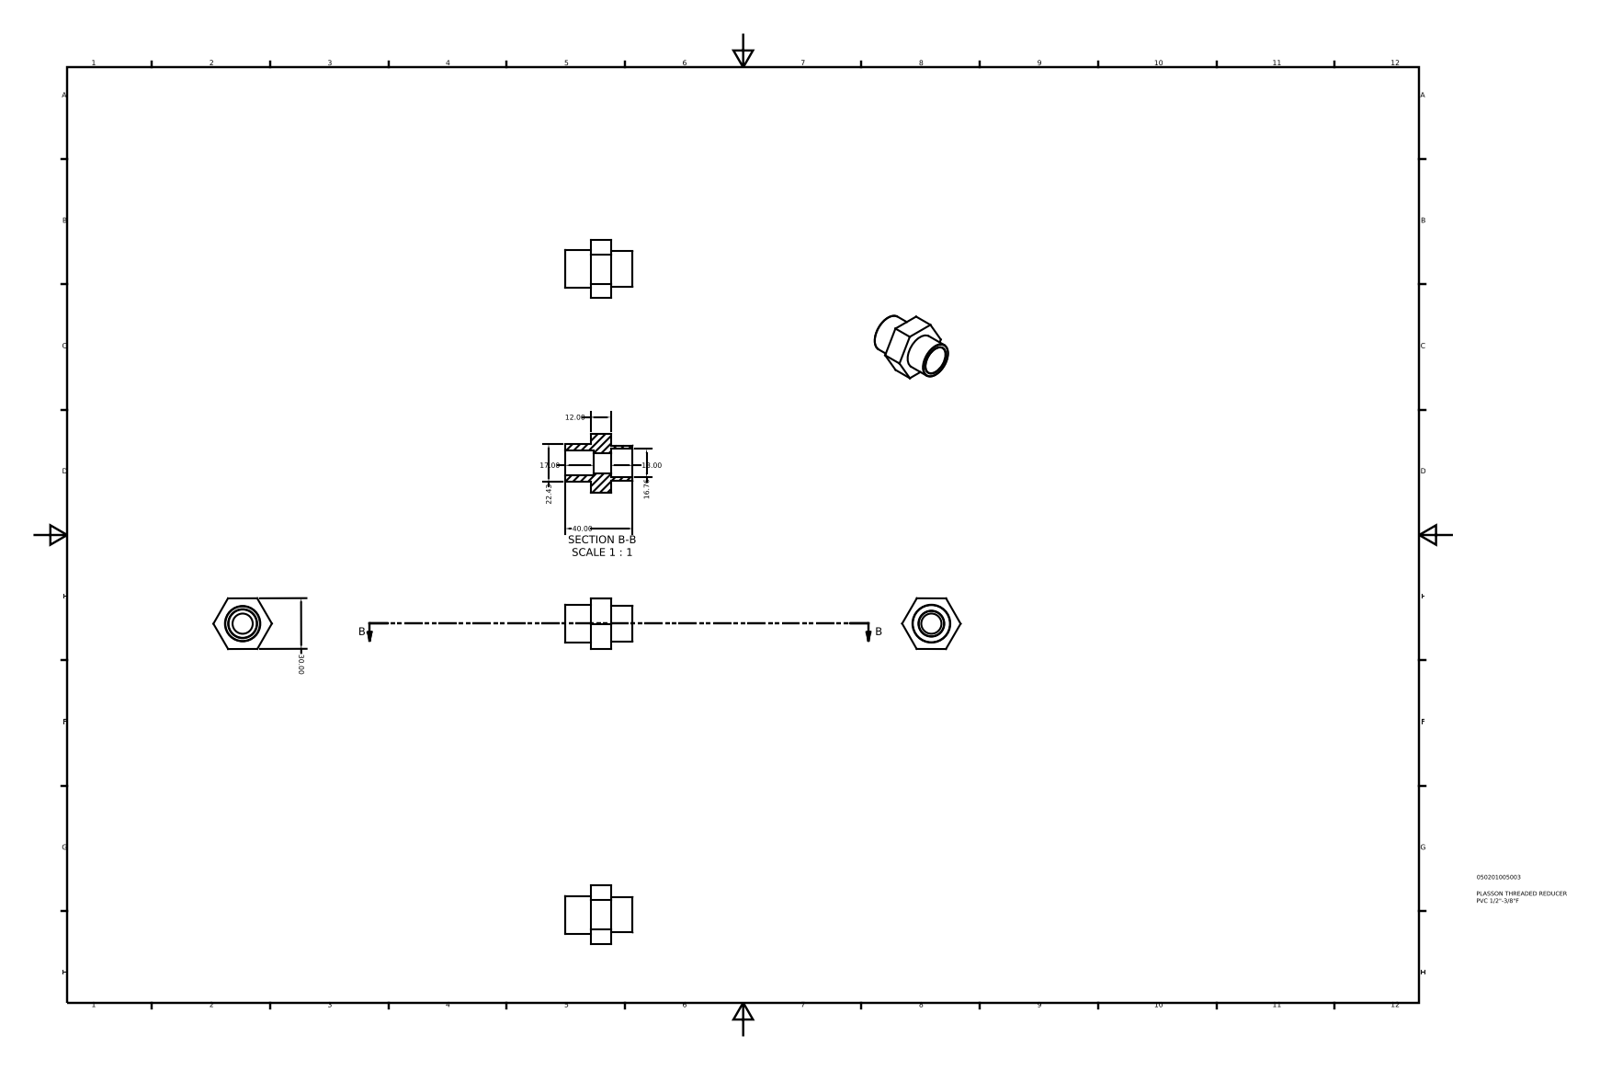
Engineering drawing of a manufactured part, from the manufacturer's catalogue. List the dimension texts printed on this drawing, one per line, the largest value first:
40.00
30.00
22.43
17.00
16.76
13.00
12.00
